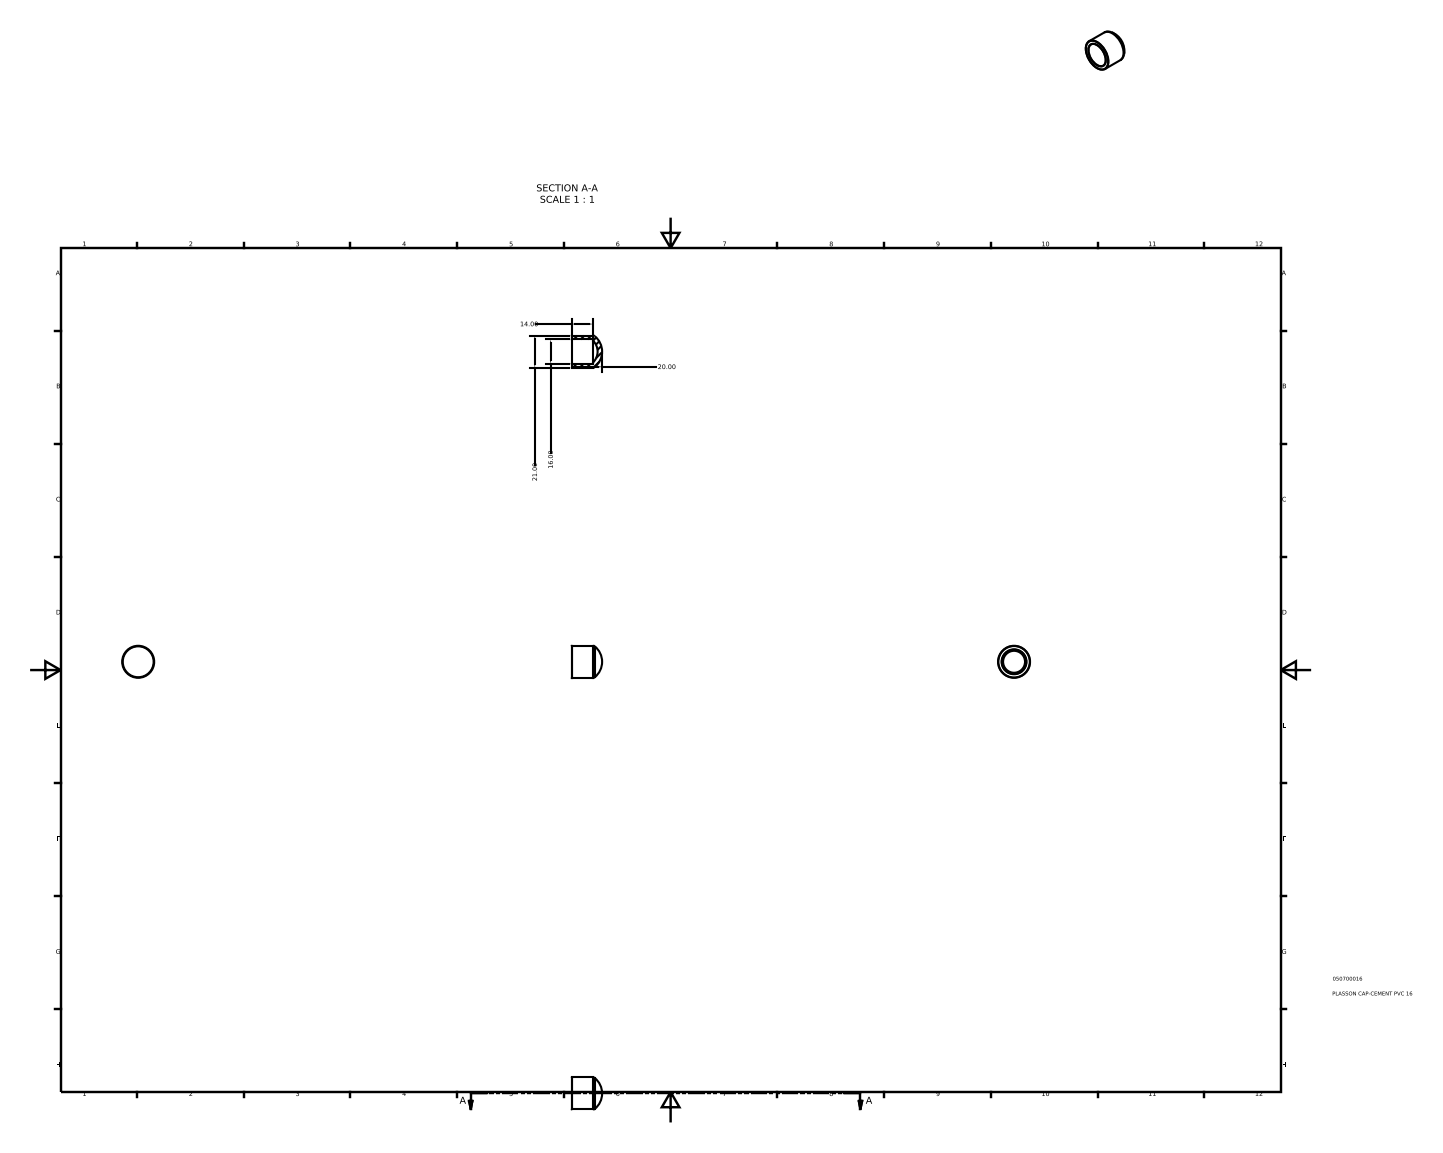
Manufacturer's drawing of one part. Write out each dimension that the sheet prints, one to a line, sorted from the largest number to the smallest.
21.00
20.00
16.00
14.00
